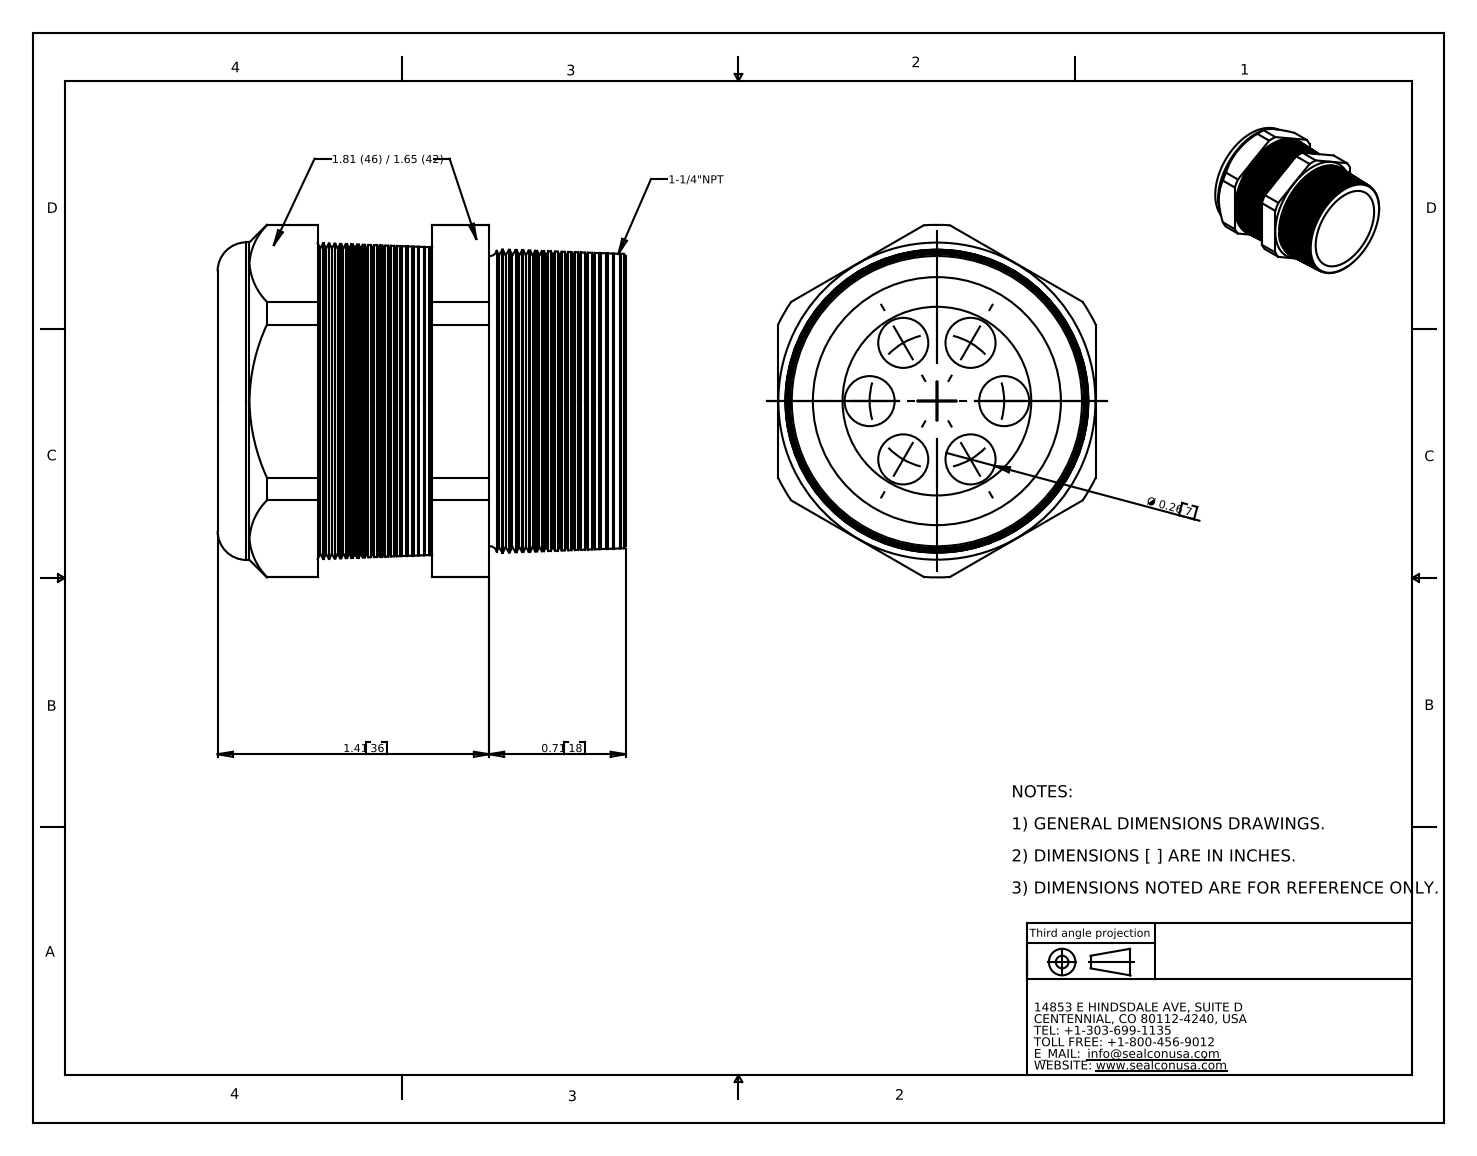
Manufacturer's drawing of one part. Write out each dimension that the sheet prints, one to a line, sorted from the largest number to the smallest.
1.41 36
0.71 18
Ø 0.26 7
